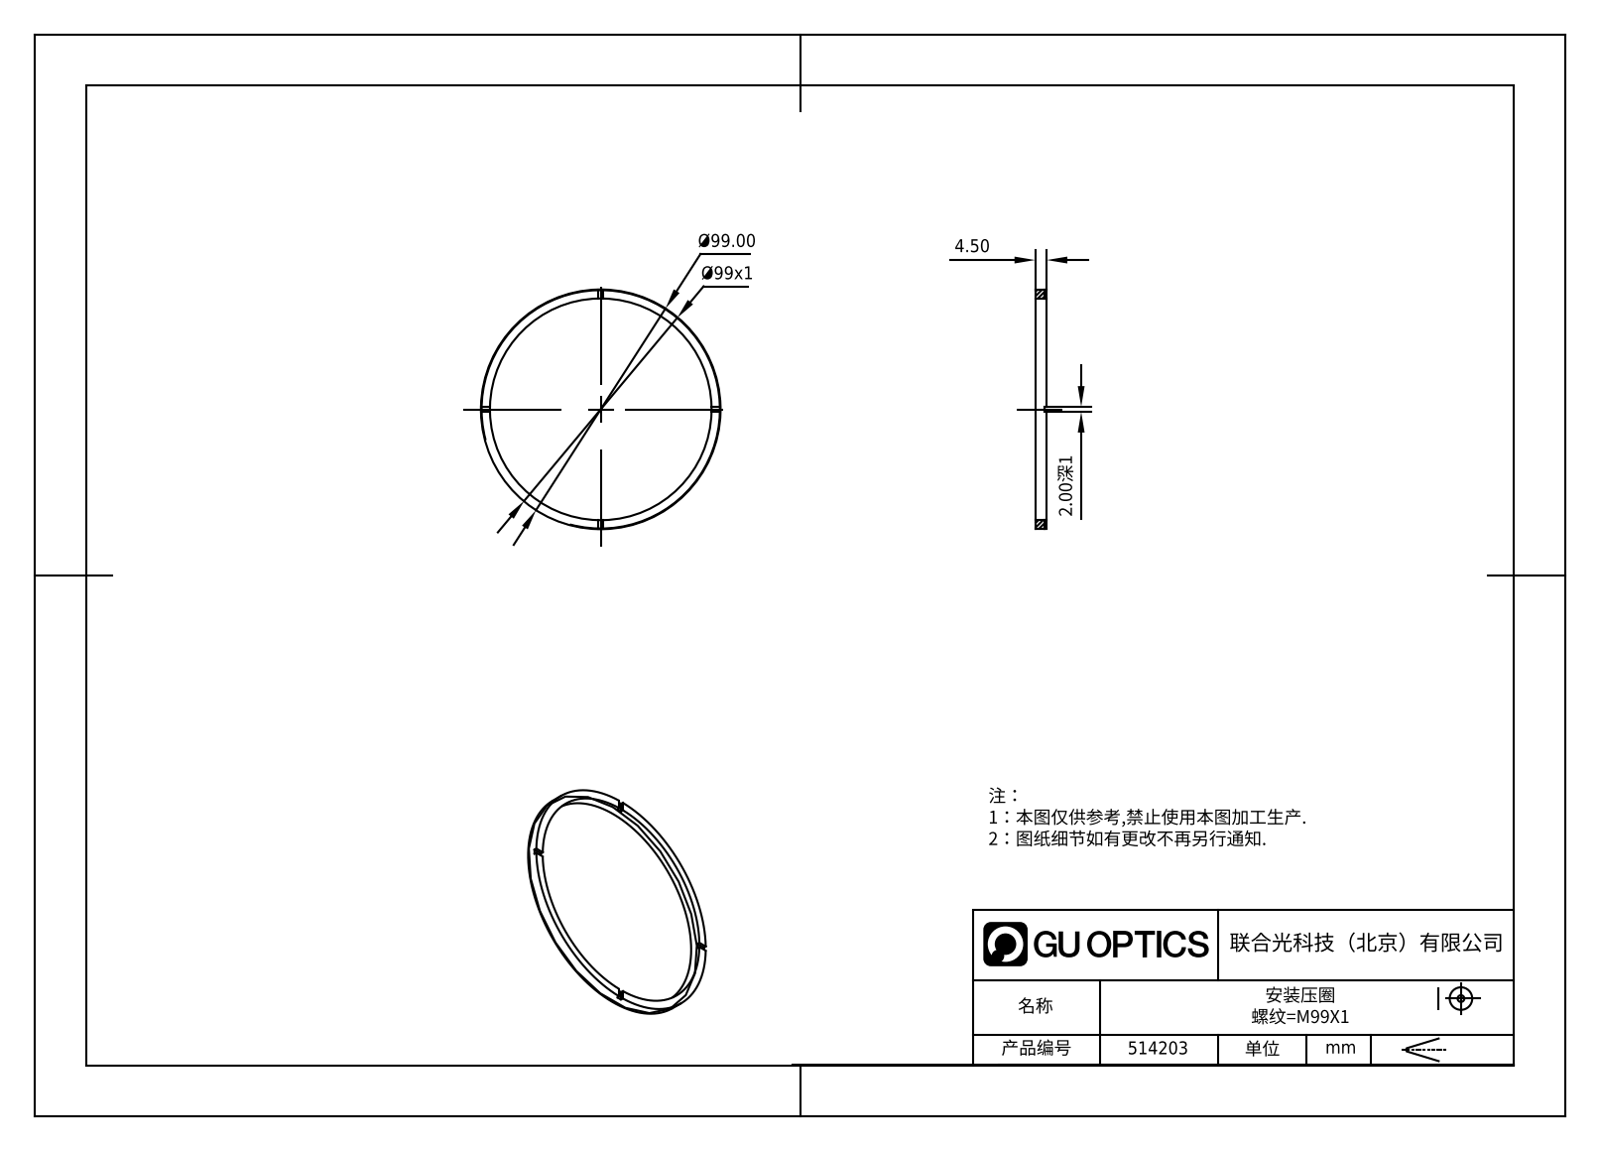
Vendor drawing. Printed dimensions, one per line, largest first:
Ø99.00
Ø99x1
4.50
2.00深1
